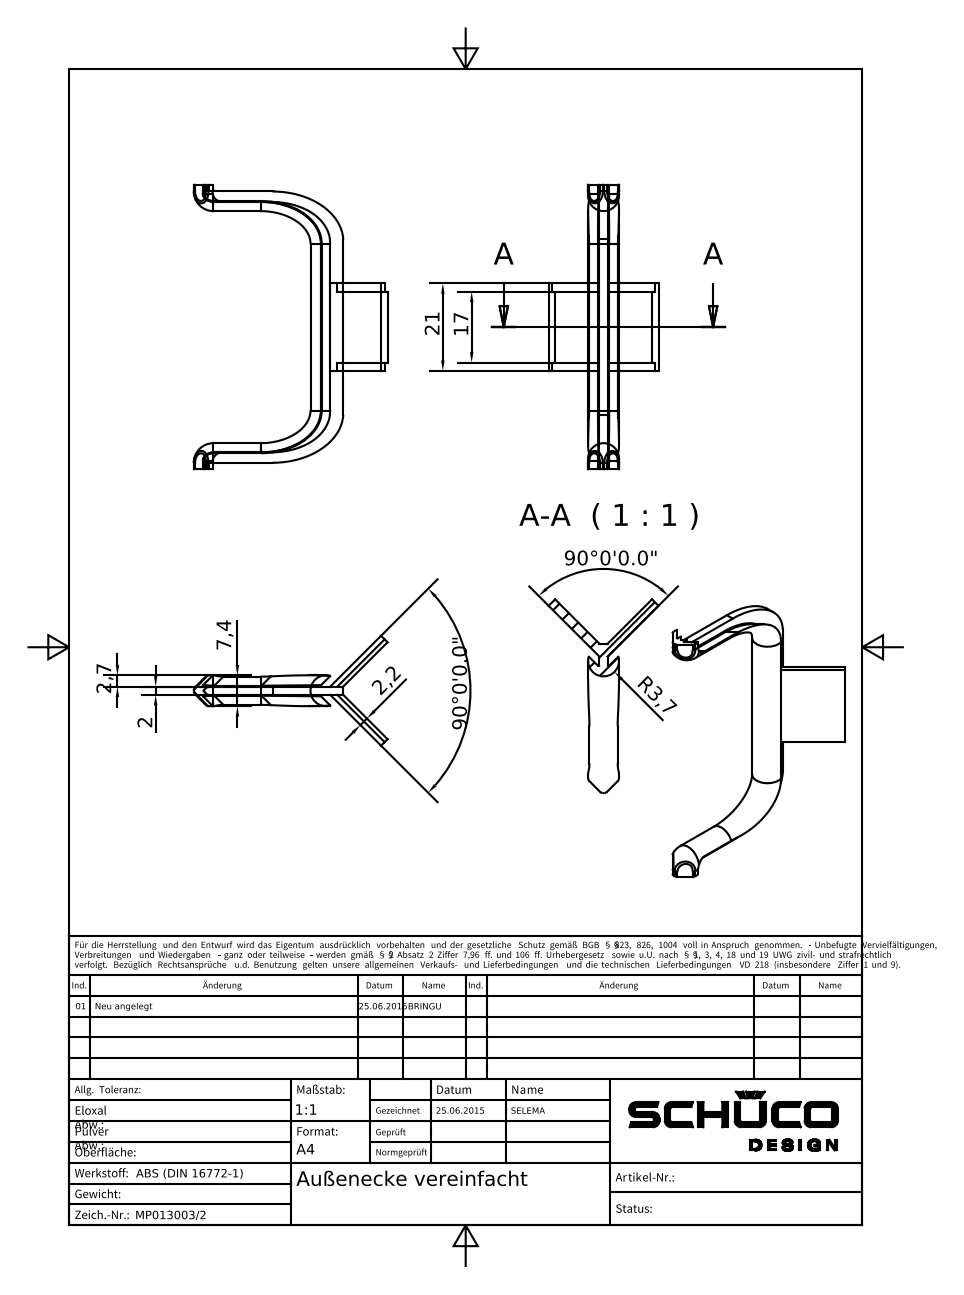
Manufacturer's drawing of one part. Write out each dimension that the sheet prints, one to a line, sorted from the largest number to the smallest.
90°0'0.0"
90°0'0.0"
21
17
7,4
R3,7
2,7
2,2
2
